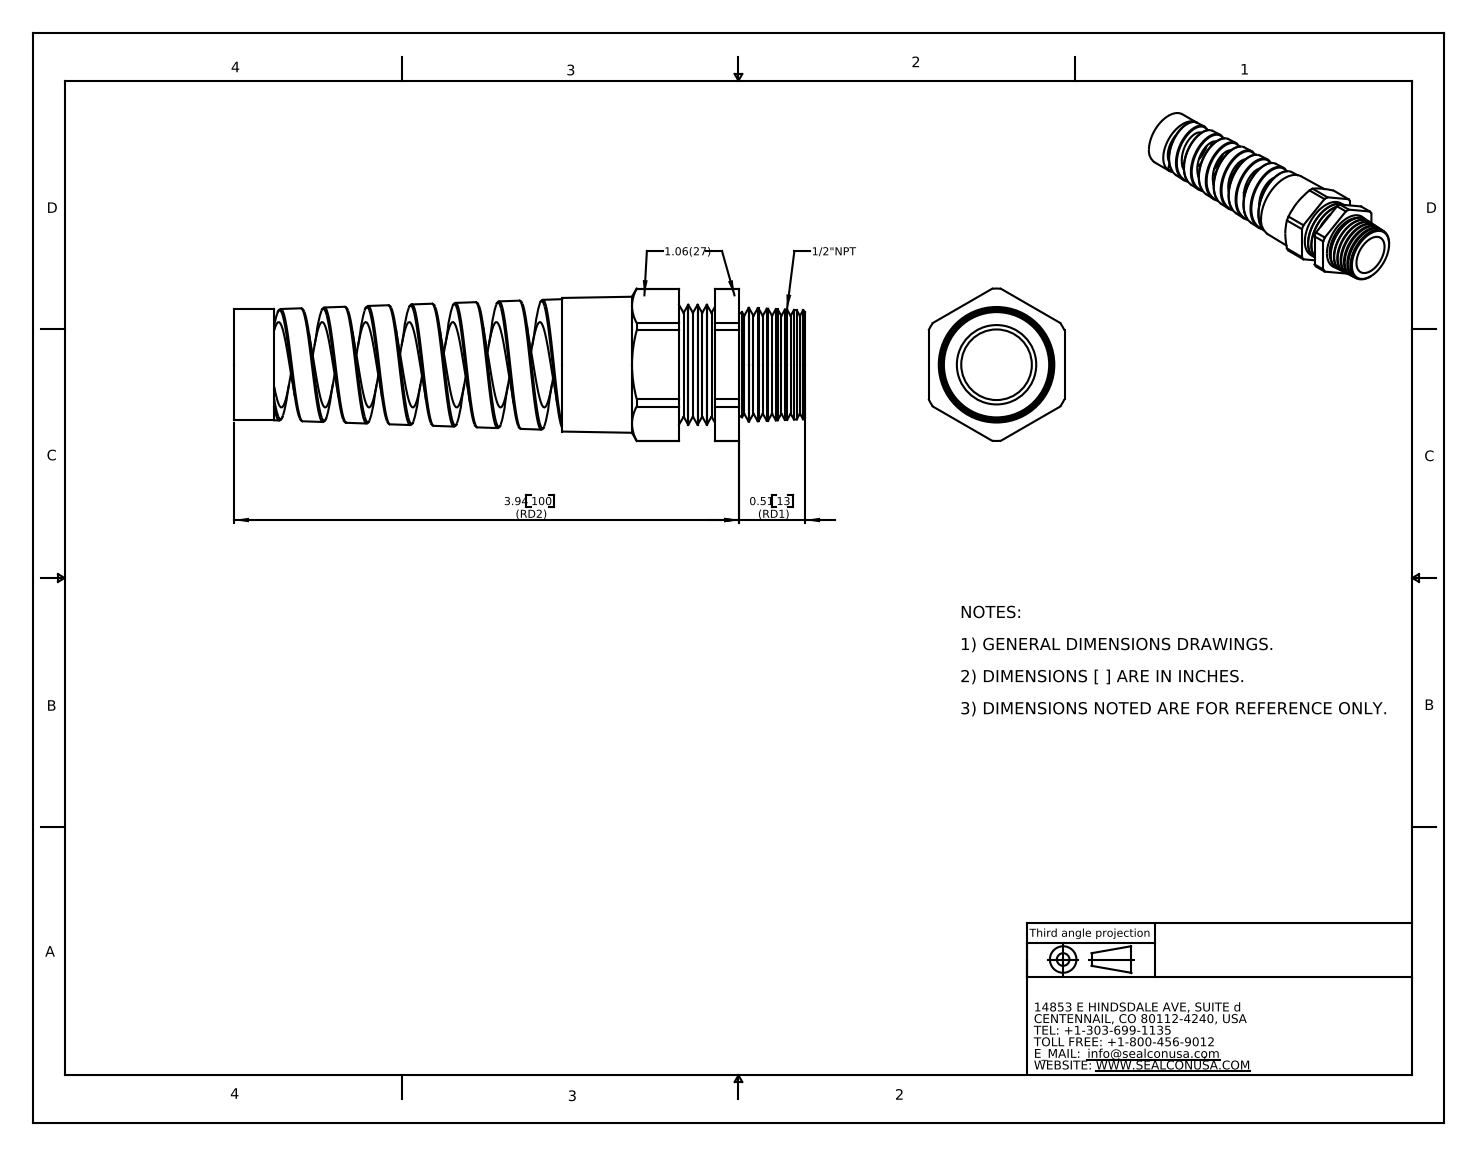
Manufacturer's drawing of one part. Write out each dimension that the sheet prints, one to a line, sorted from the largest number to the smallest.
3.94 100 (RD2)
0.51 13 (RD1)
